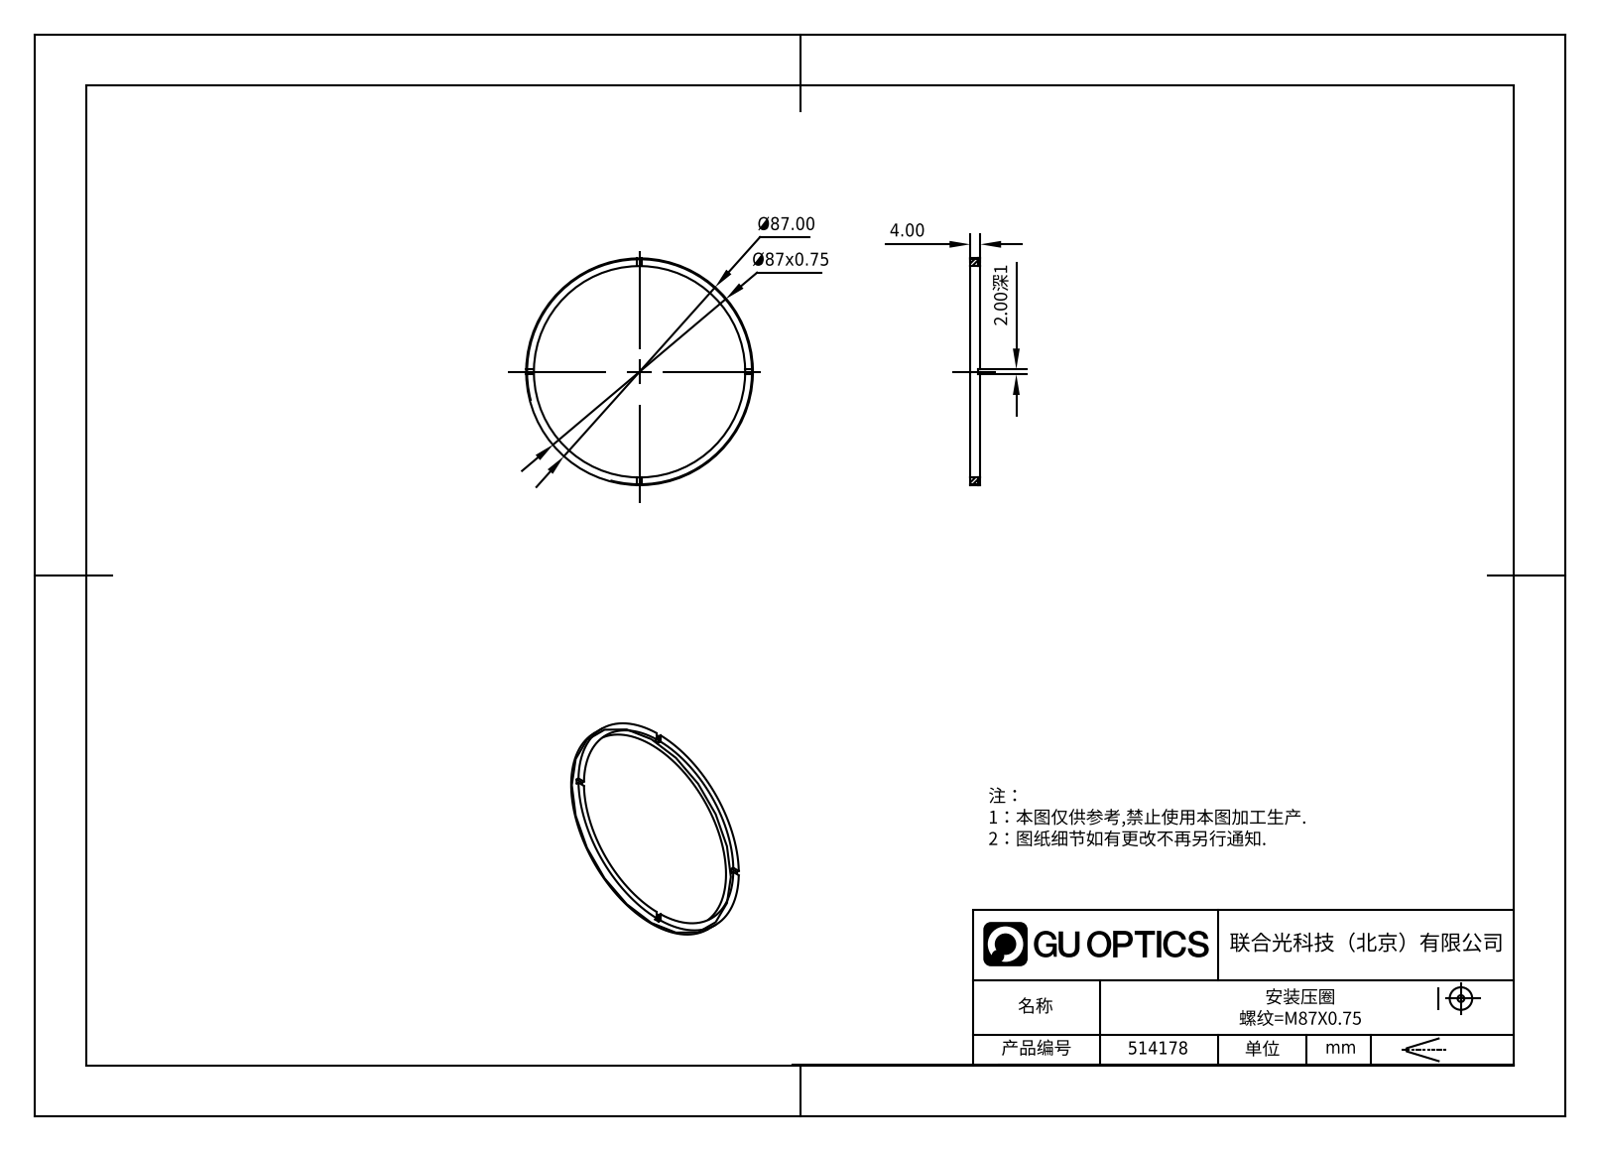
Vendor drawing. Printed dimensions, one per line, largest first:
Ø87.00
Ø87x0.75
4.00
2.00深1
